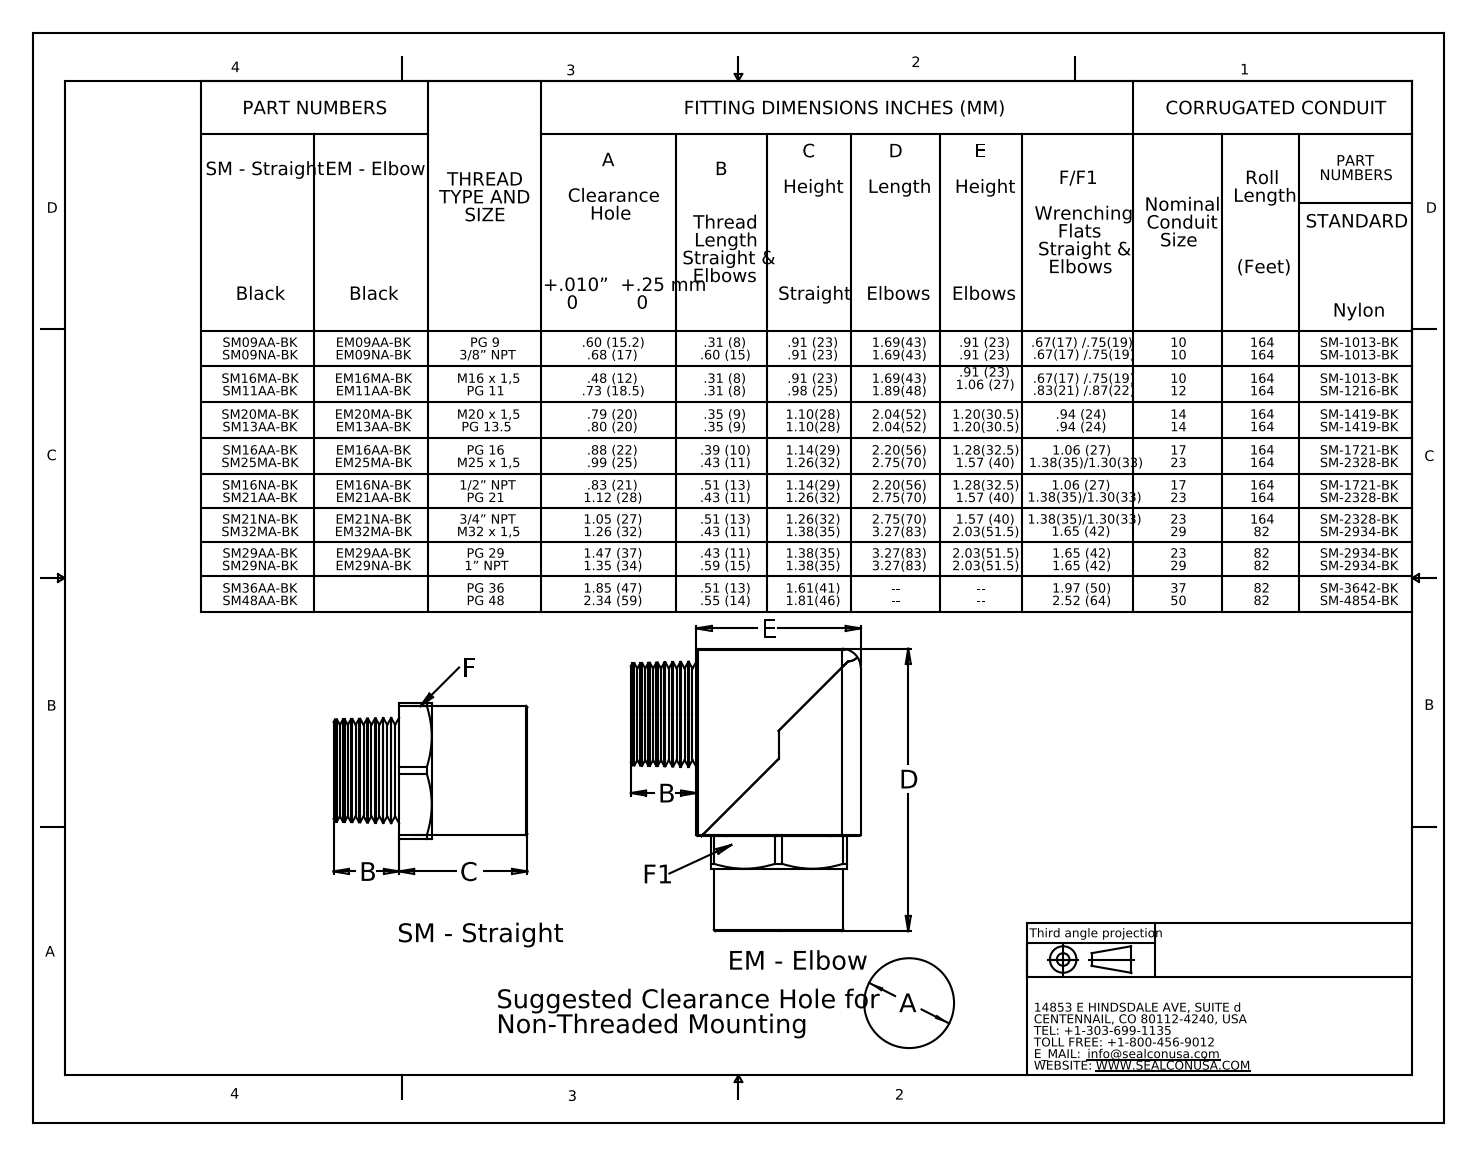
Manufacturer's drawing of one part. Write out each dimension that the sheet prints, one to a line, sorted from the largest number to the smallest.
A
B
C
E
D
B
